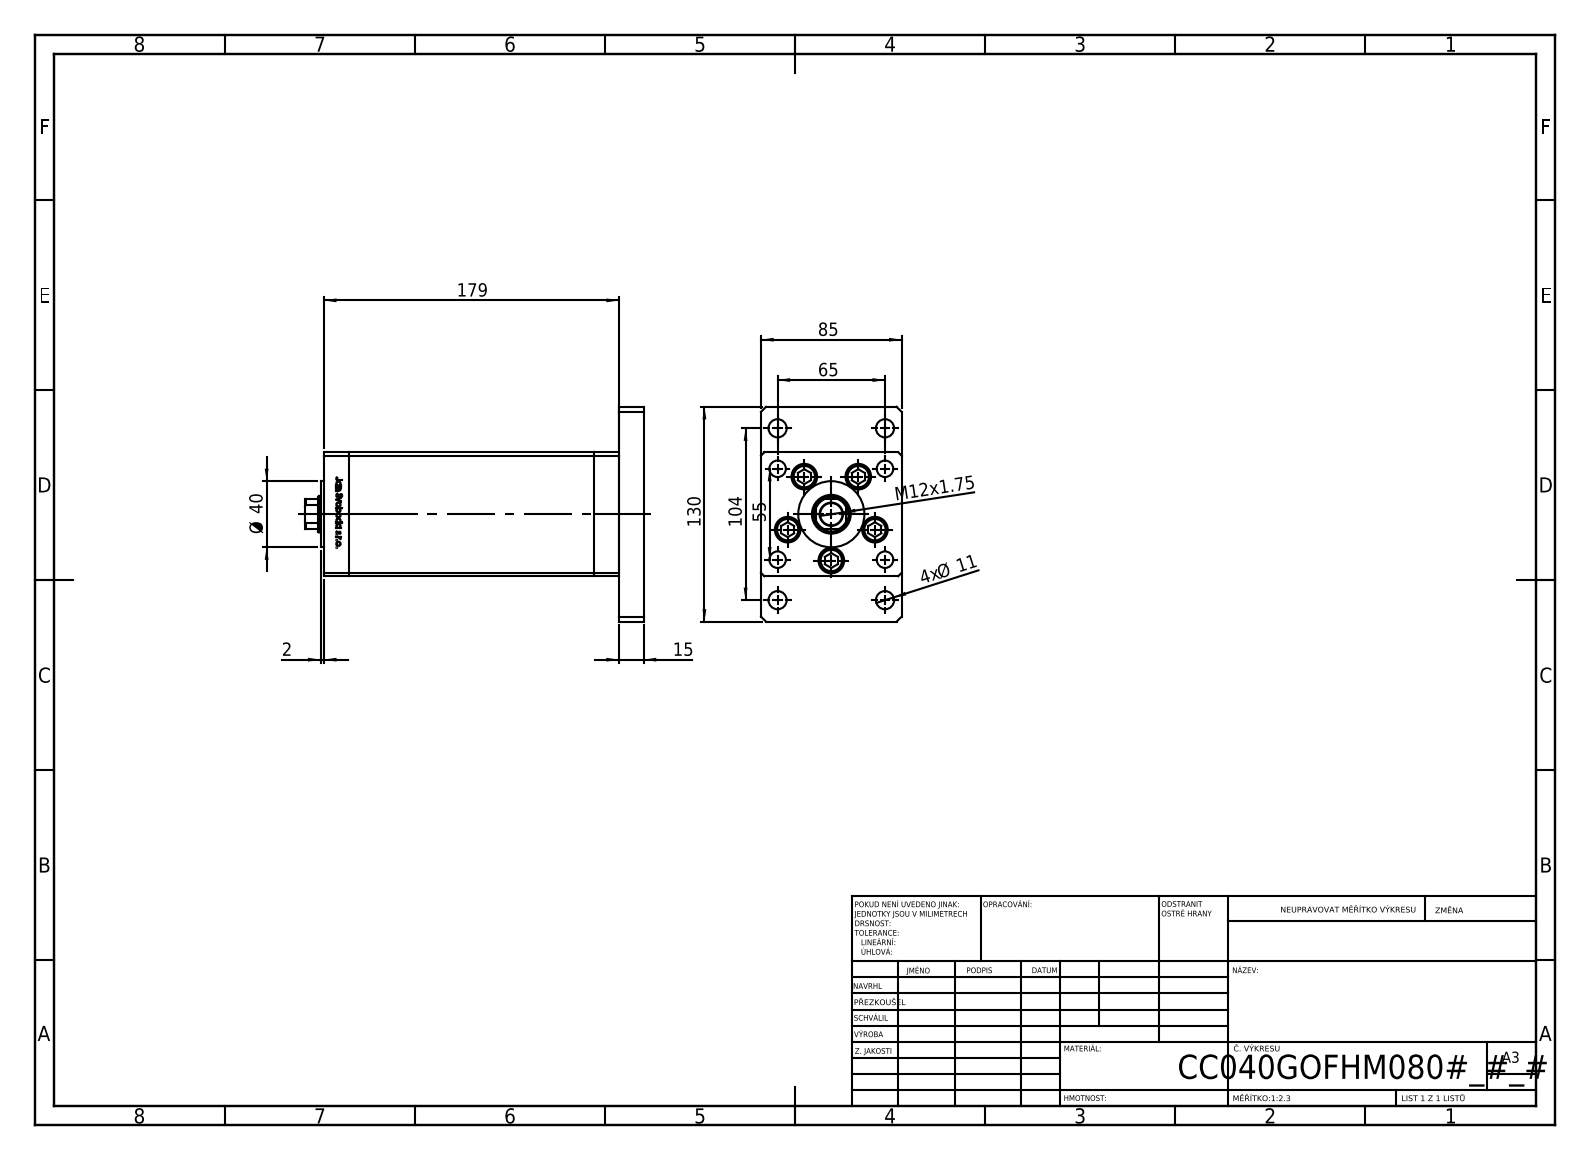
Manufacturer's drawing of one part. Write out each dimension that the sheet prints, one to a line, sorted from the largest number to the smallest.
179
130
104
85
65
55
Ø 40
15
M12x1.75
4x Ø 11
2
